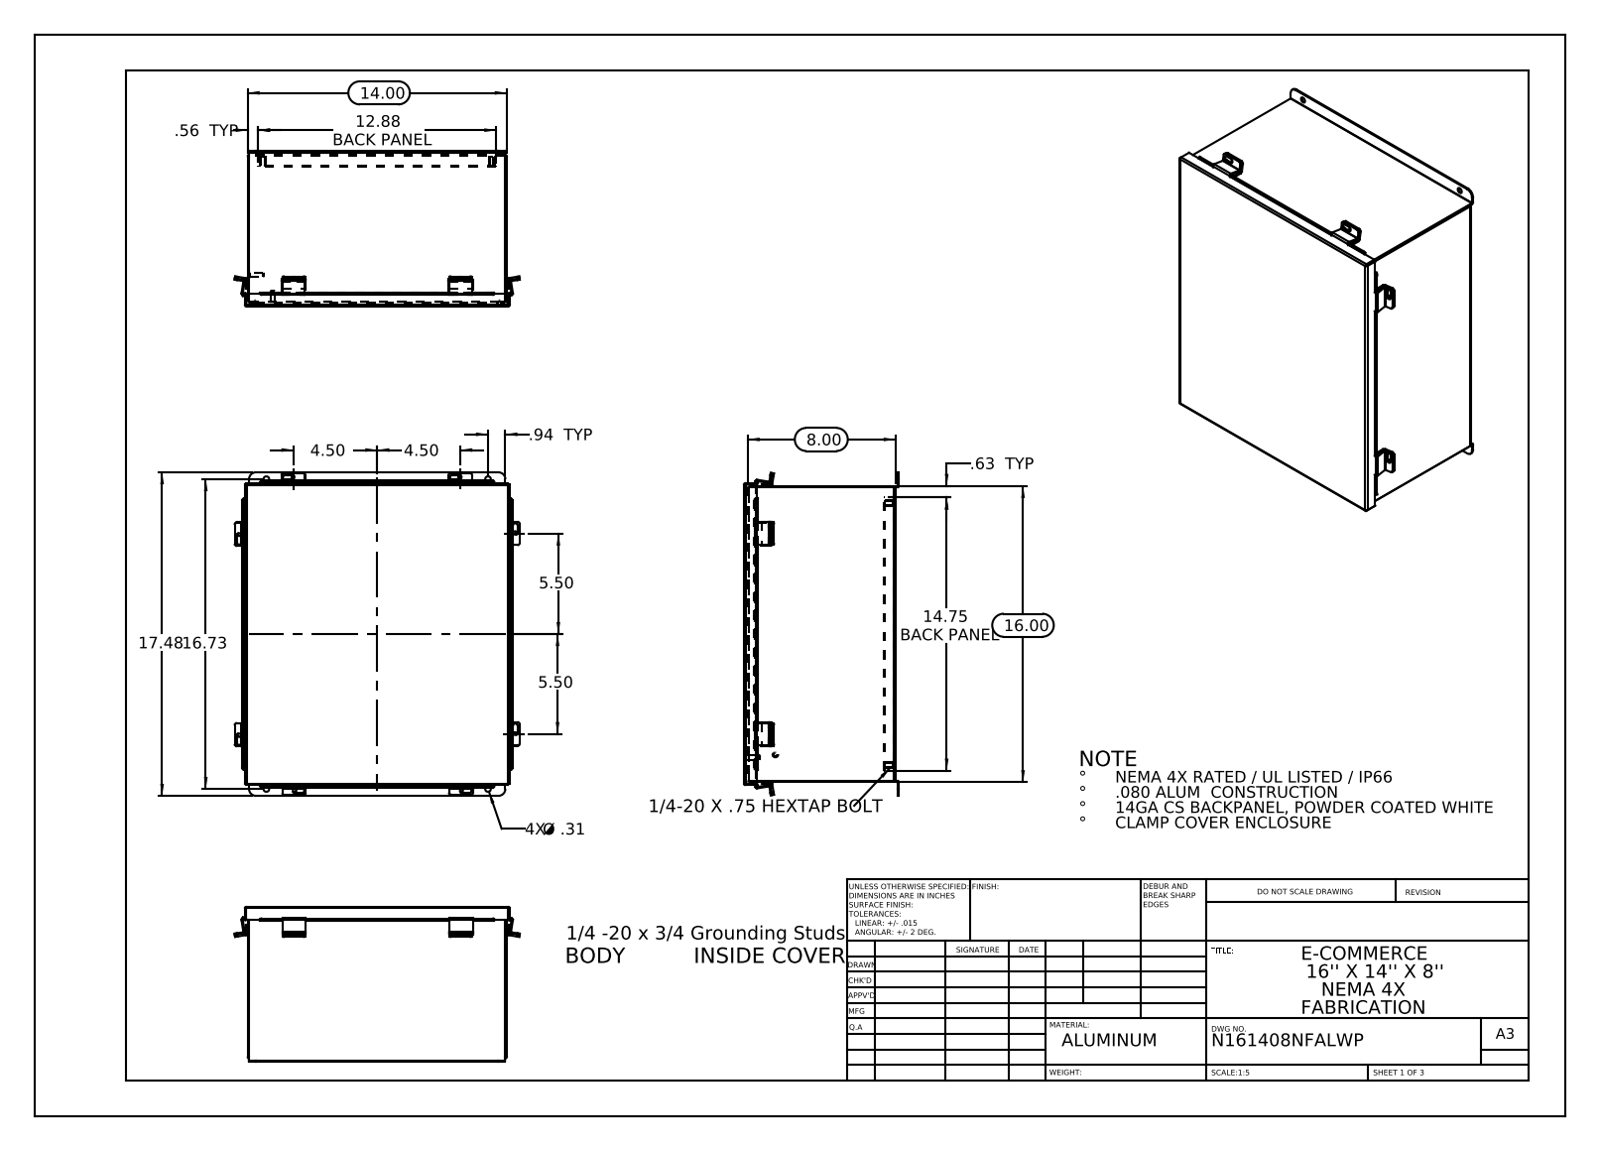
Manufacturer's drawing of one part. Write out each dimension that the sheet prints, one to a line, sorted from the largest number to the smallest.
17.48
16.73
16.00
14.75 BACK PANEL
14.00
12.88 BACK PANEL
8.00
5.50
5.50
4.50
4.50
.94 TYP
.63 TYP
.56 TYP
4X Ø .31
